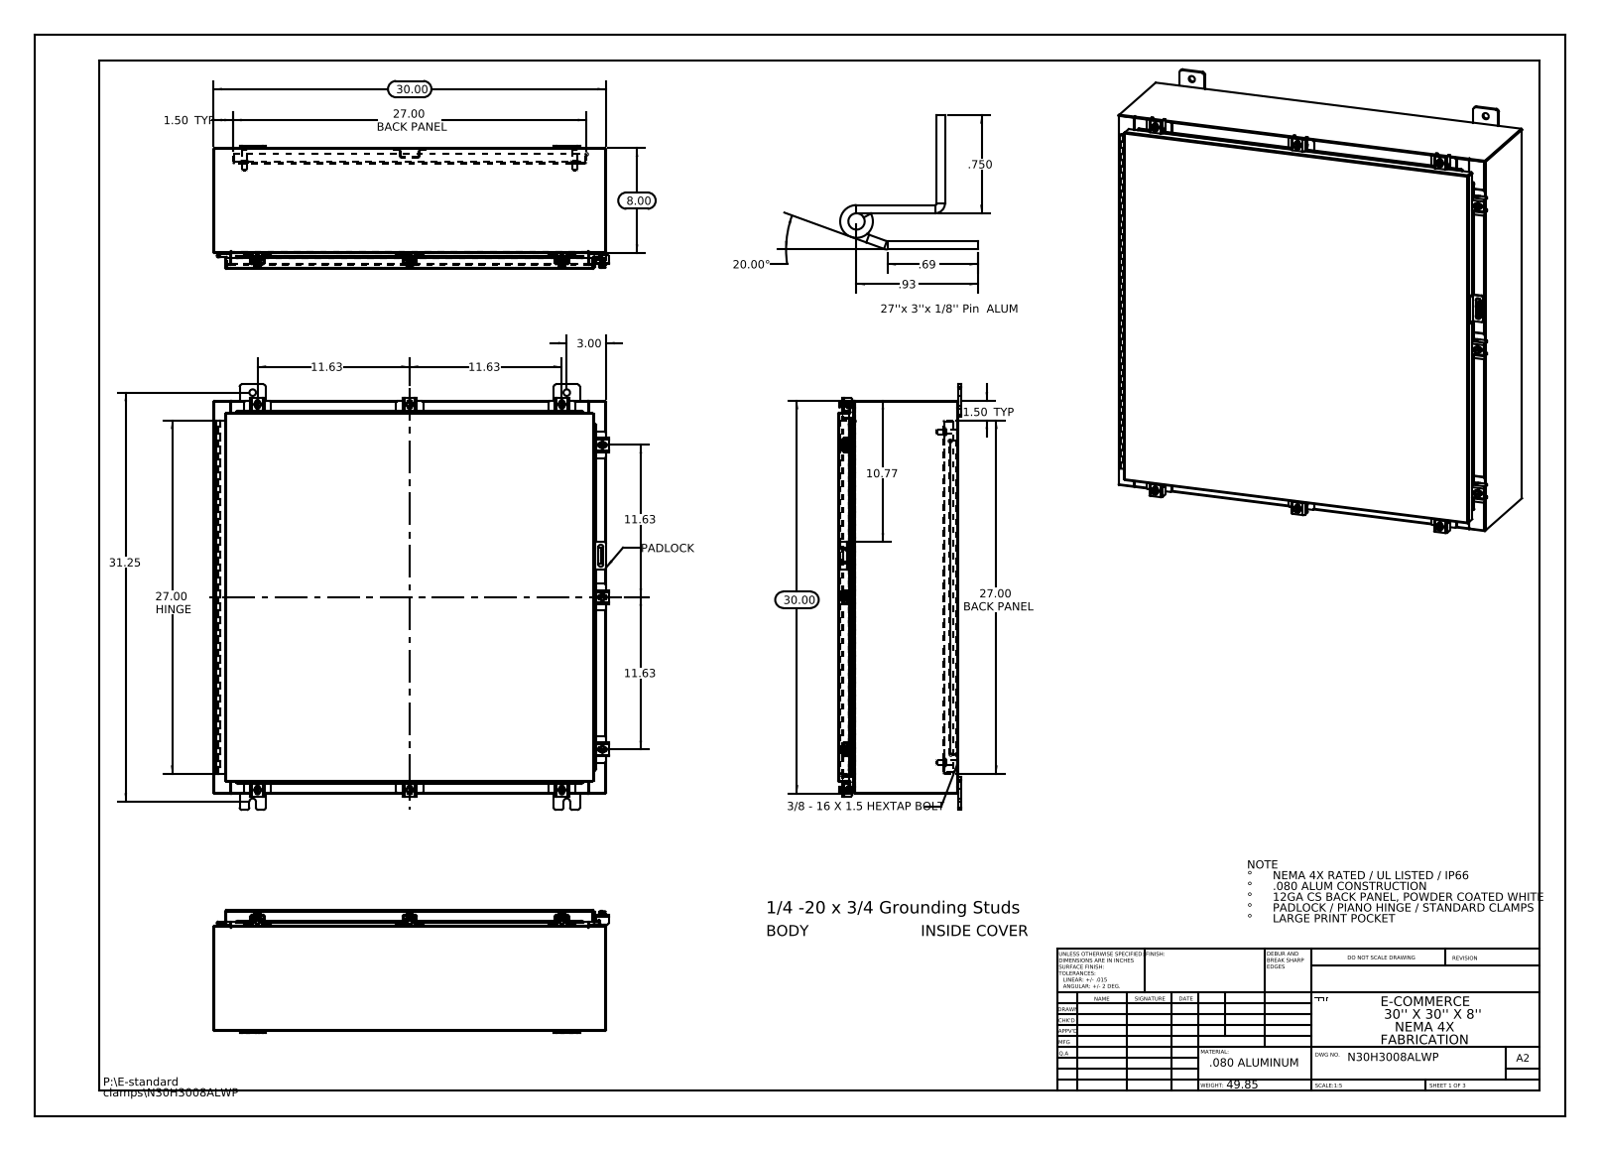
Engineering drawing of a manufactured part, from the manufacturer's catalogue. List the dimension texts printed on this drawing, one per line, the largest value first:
31.25
30.00
30.00
27.00 HINGE
27.00 BACK PANEL
27.00 BACK PANEL
20.00°
11.63
11.63
11.63
11.63
10.77
8.00
3.00
1.50 TYP
1.50 TYP
.93
.750
.69
